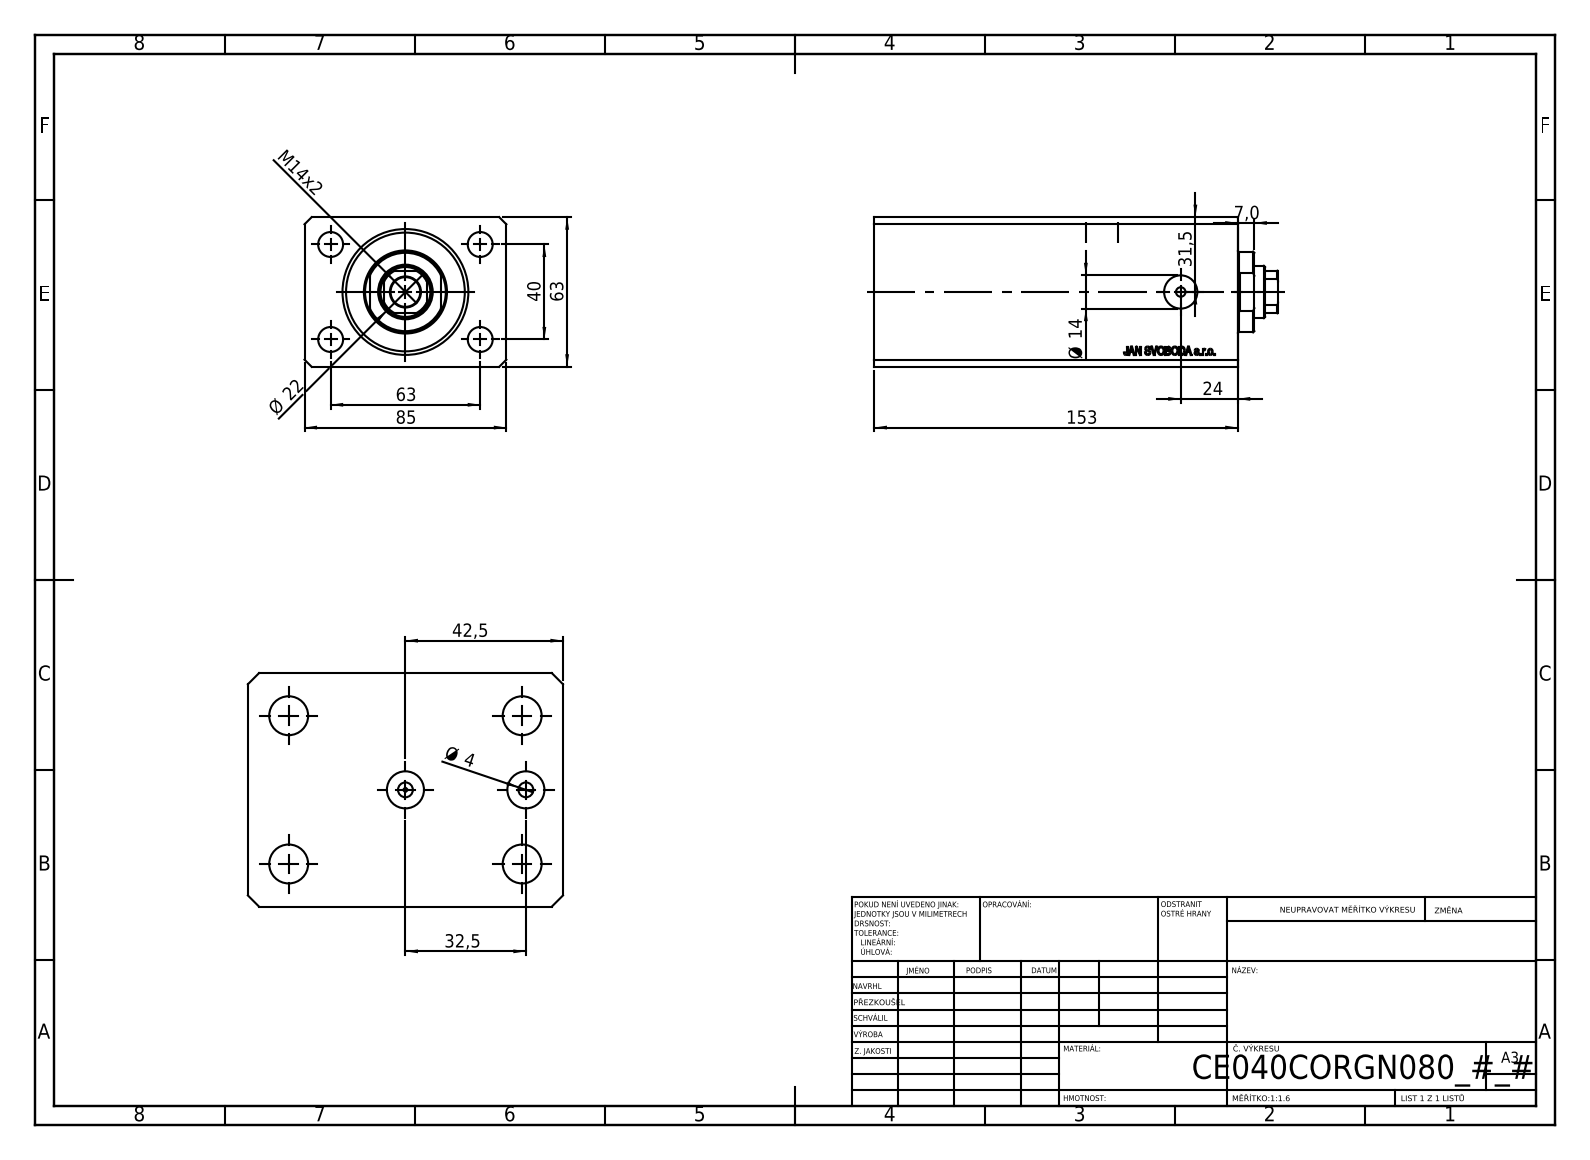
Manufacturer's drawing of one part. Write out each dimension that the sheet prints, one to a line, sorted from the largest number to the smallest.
153
85
63
63
42,5
40
32,5
31,5
24
Ø 22
M14x2
Ø 14
7,0
Ø 4
